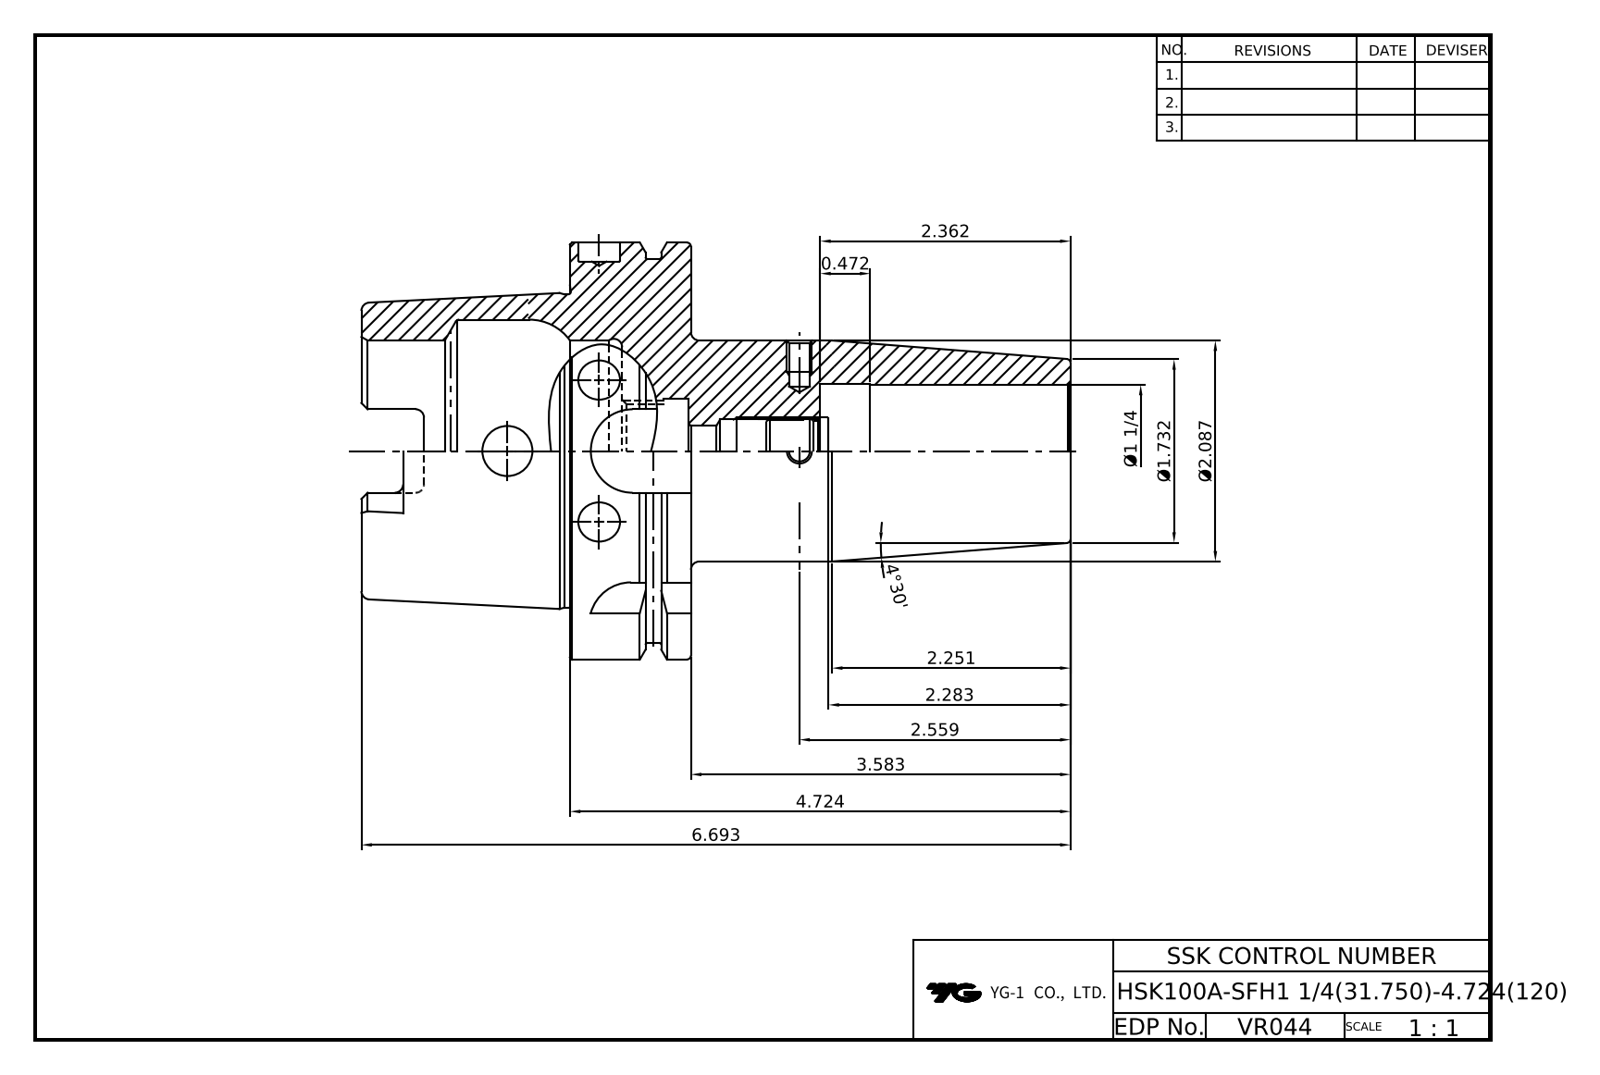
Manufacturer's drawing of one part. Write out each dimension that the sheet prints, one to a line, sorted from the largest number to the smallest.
6.693
4.724
4°30'
3.583
2.559
2.362
2.283
2.251
Ø2.087
Ø1.732
0.472
